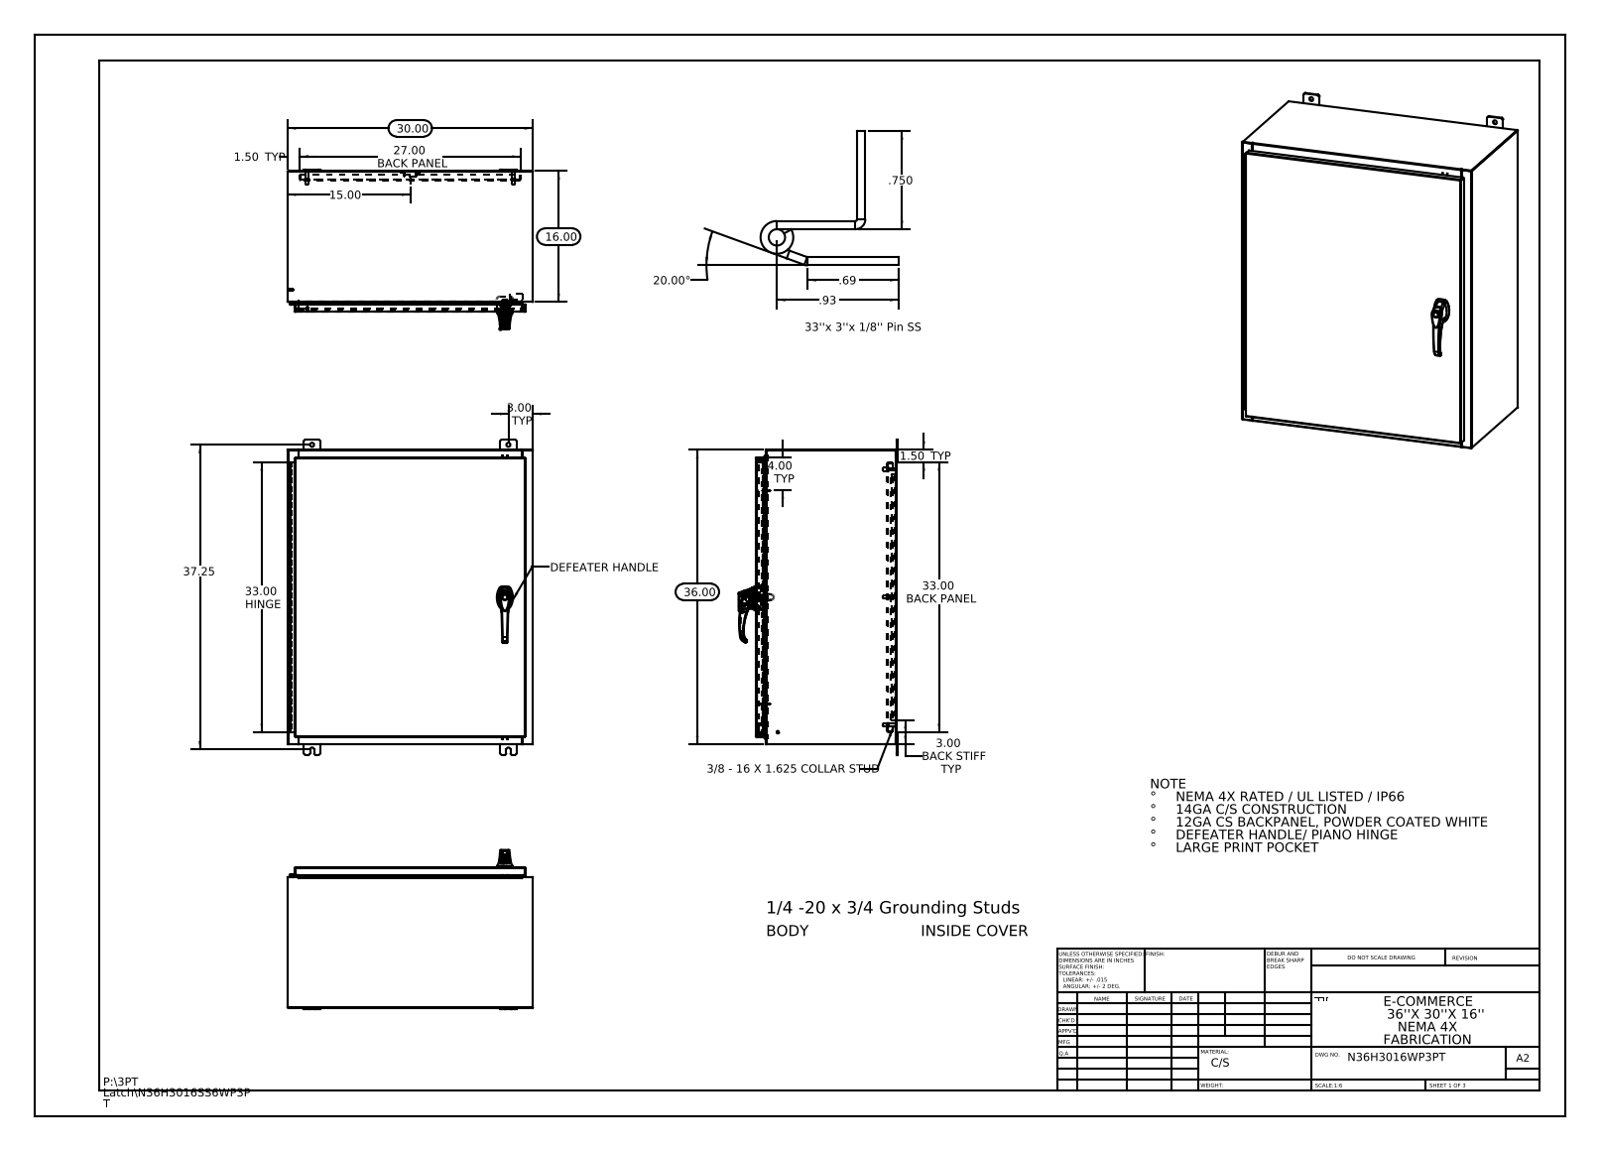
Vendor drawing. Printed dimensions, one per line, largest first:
37.25
36.00
33.00 HINGE
33.00 BACK PANEL
30.00
27.00 BACK PANEL
20.00°
16.00
15.00
4.00 TYP
3.00 TYP
3.00 BACK STIFF TYP
1.50 TYP
1.50 TYP
.93
.750
.69
